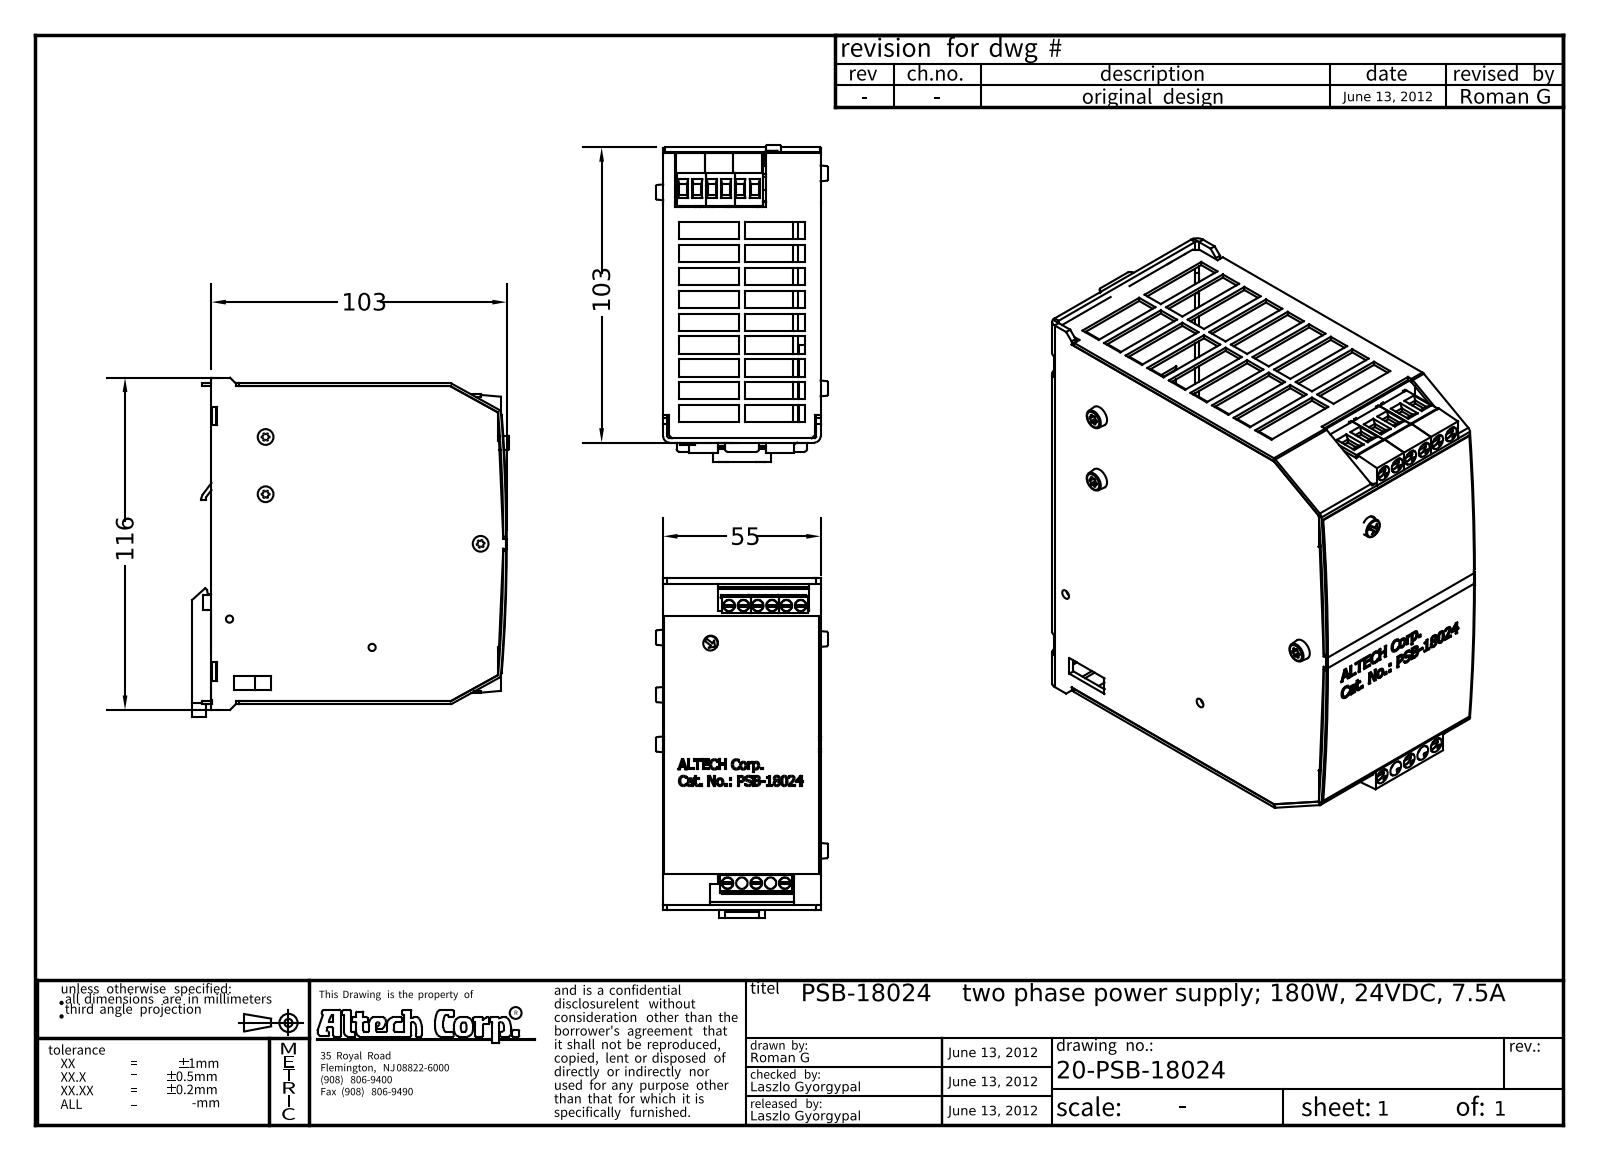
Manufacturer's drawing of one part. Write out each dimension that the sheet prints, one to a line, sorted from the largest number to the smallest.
116
103
103
55
